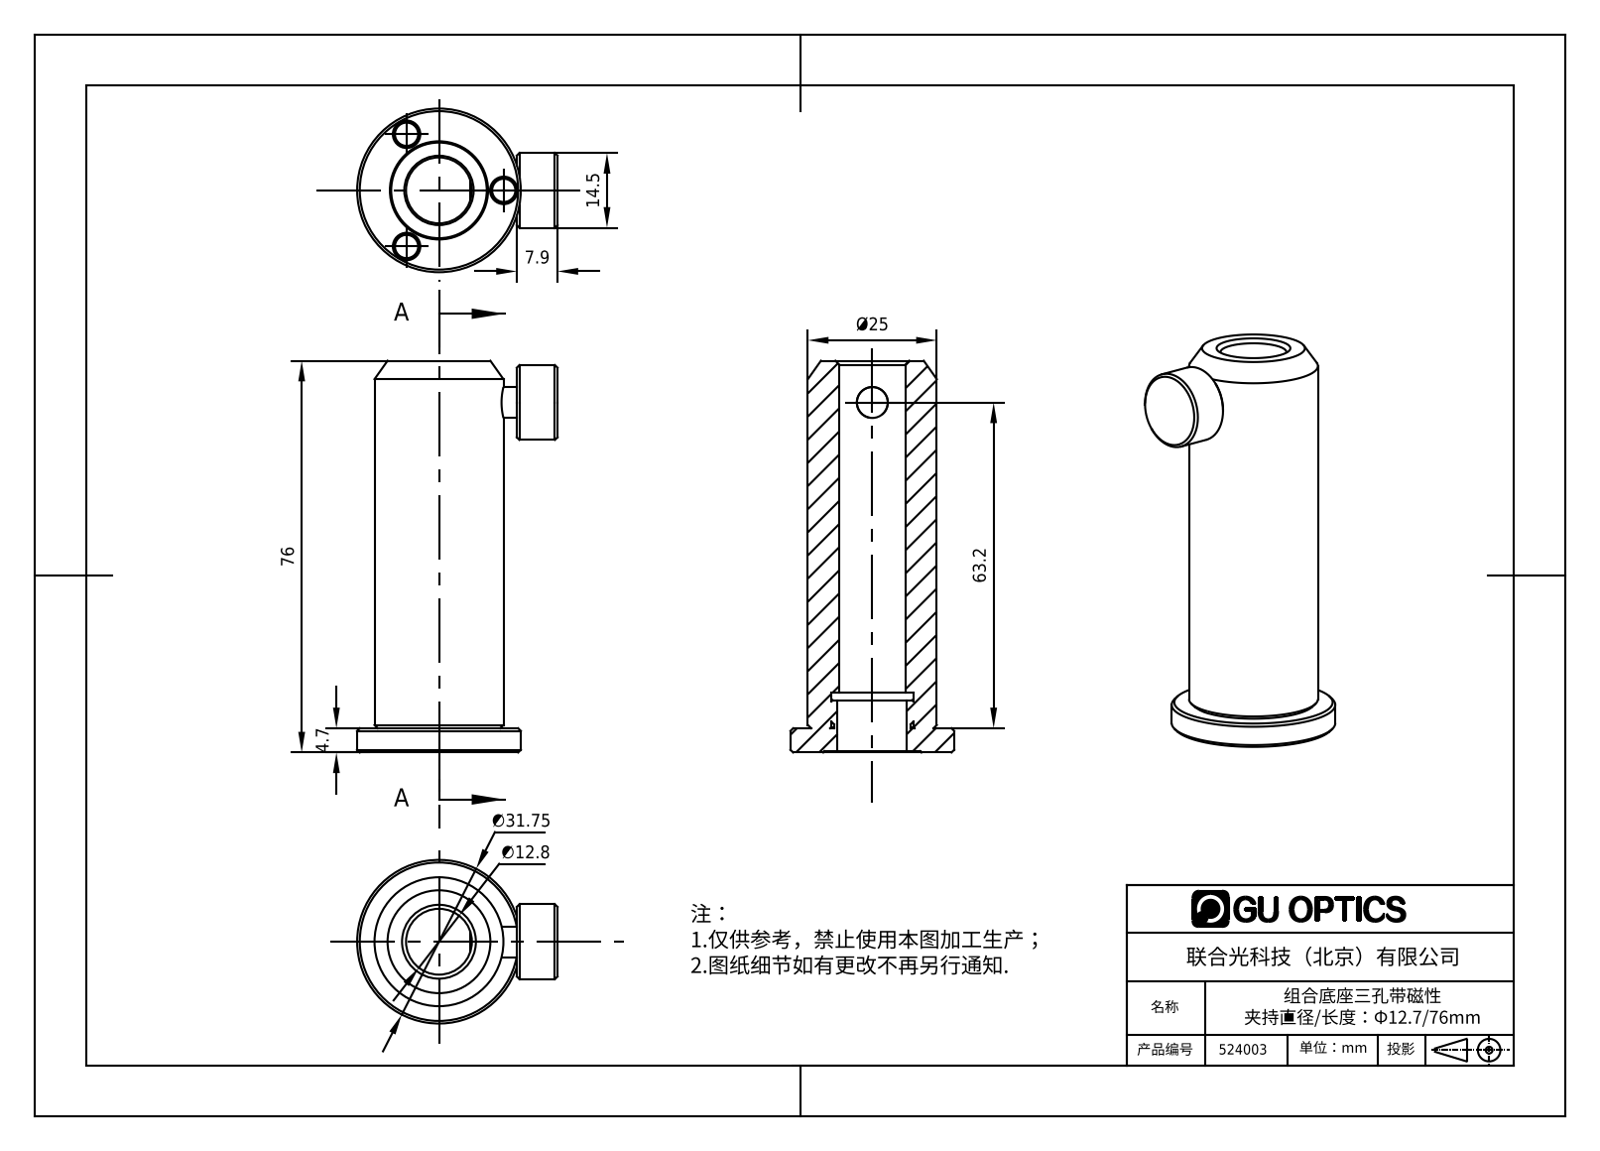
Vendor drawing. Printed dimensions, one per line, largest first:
76
63.2
∅31.75
Ø25
14.5
∅12.8
7.9
4.7
